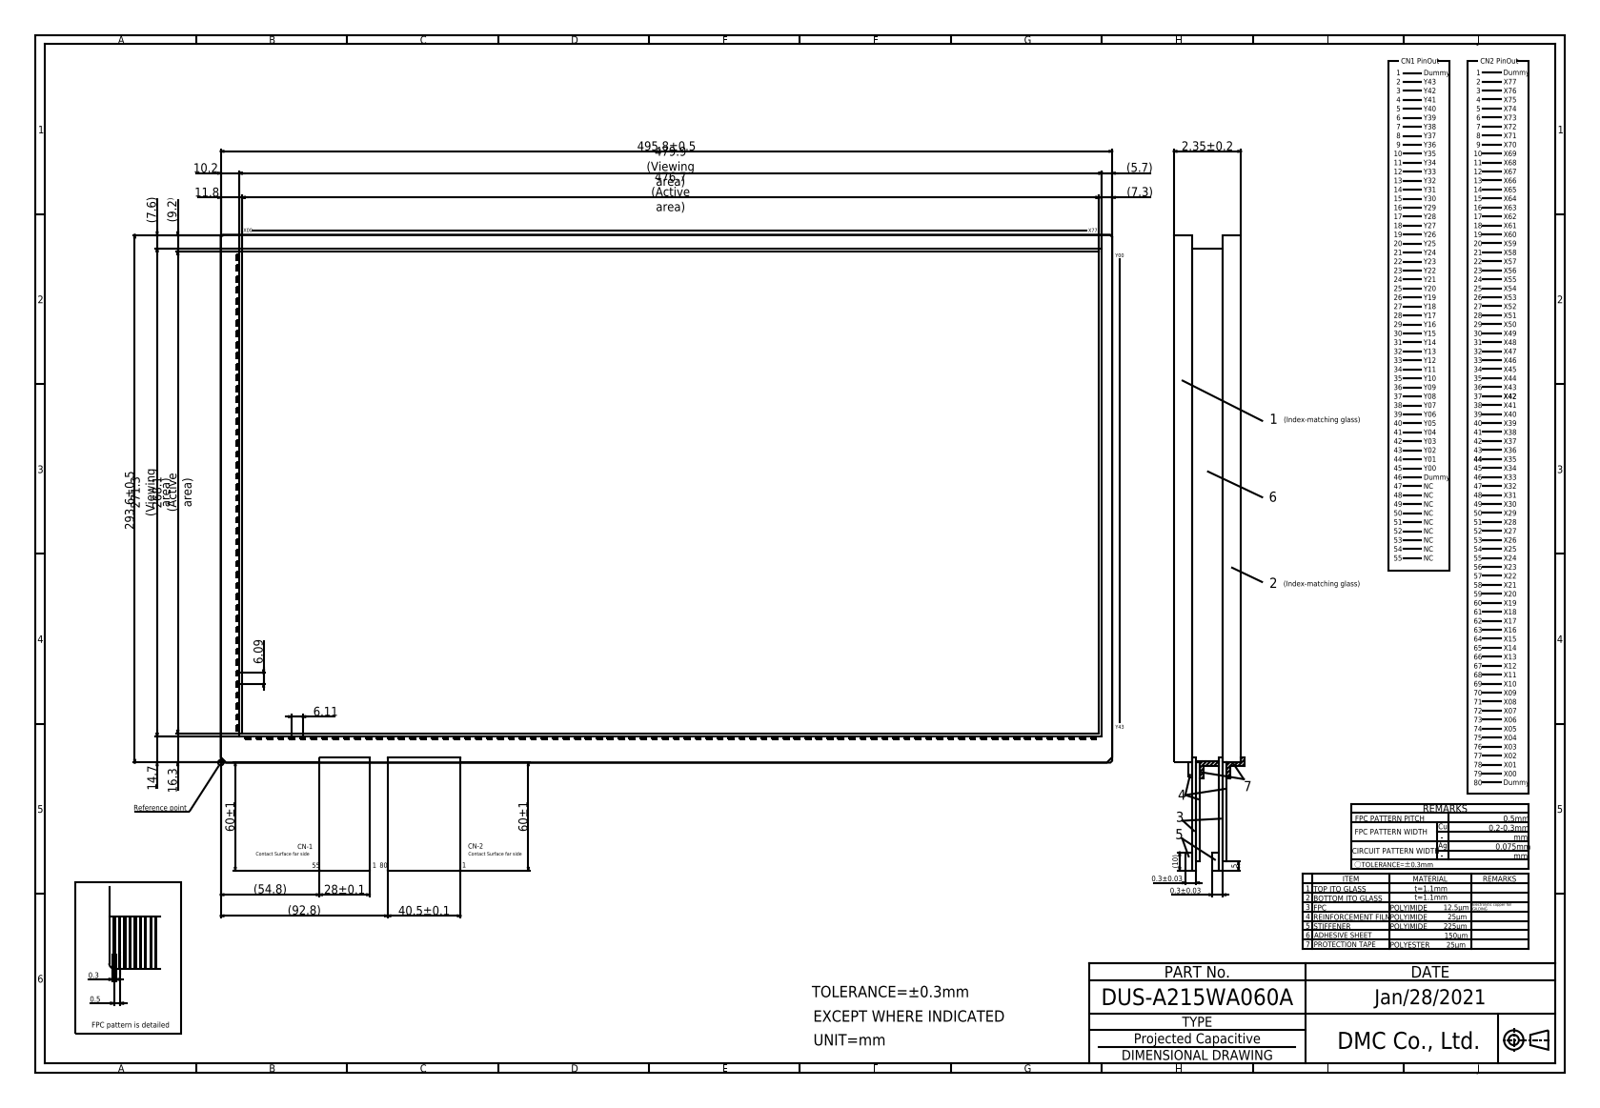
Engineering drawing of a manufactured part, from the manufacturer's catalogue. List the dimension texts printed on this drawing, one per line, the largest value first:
495.8±0.5
479.9 (Viewing area)
476.7 (Active area)
293.6±0.5
271.3 (Viewing area)
268.1 (Active area)
(92.8)
60±1
60±1
(54.8)
40.5±0.1
28±0.1
16.3
14.7
11.8
10.2
(10)
(9.2)
(7.6)
(7.3)
6.11
6.09
(5.7)
5
2.35±0.2
0.5
0.3
0.3±0.03
0.3±0.03
